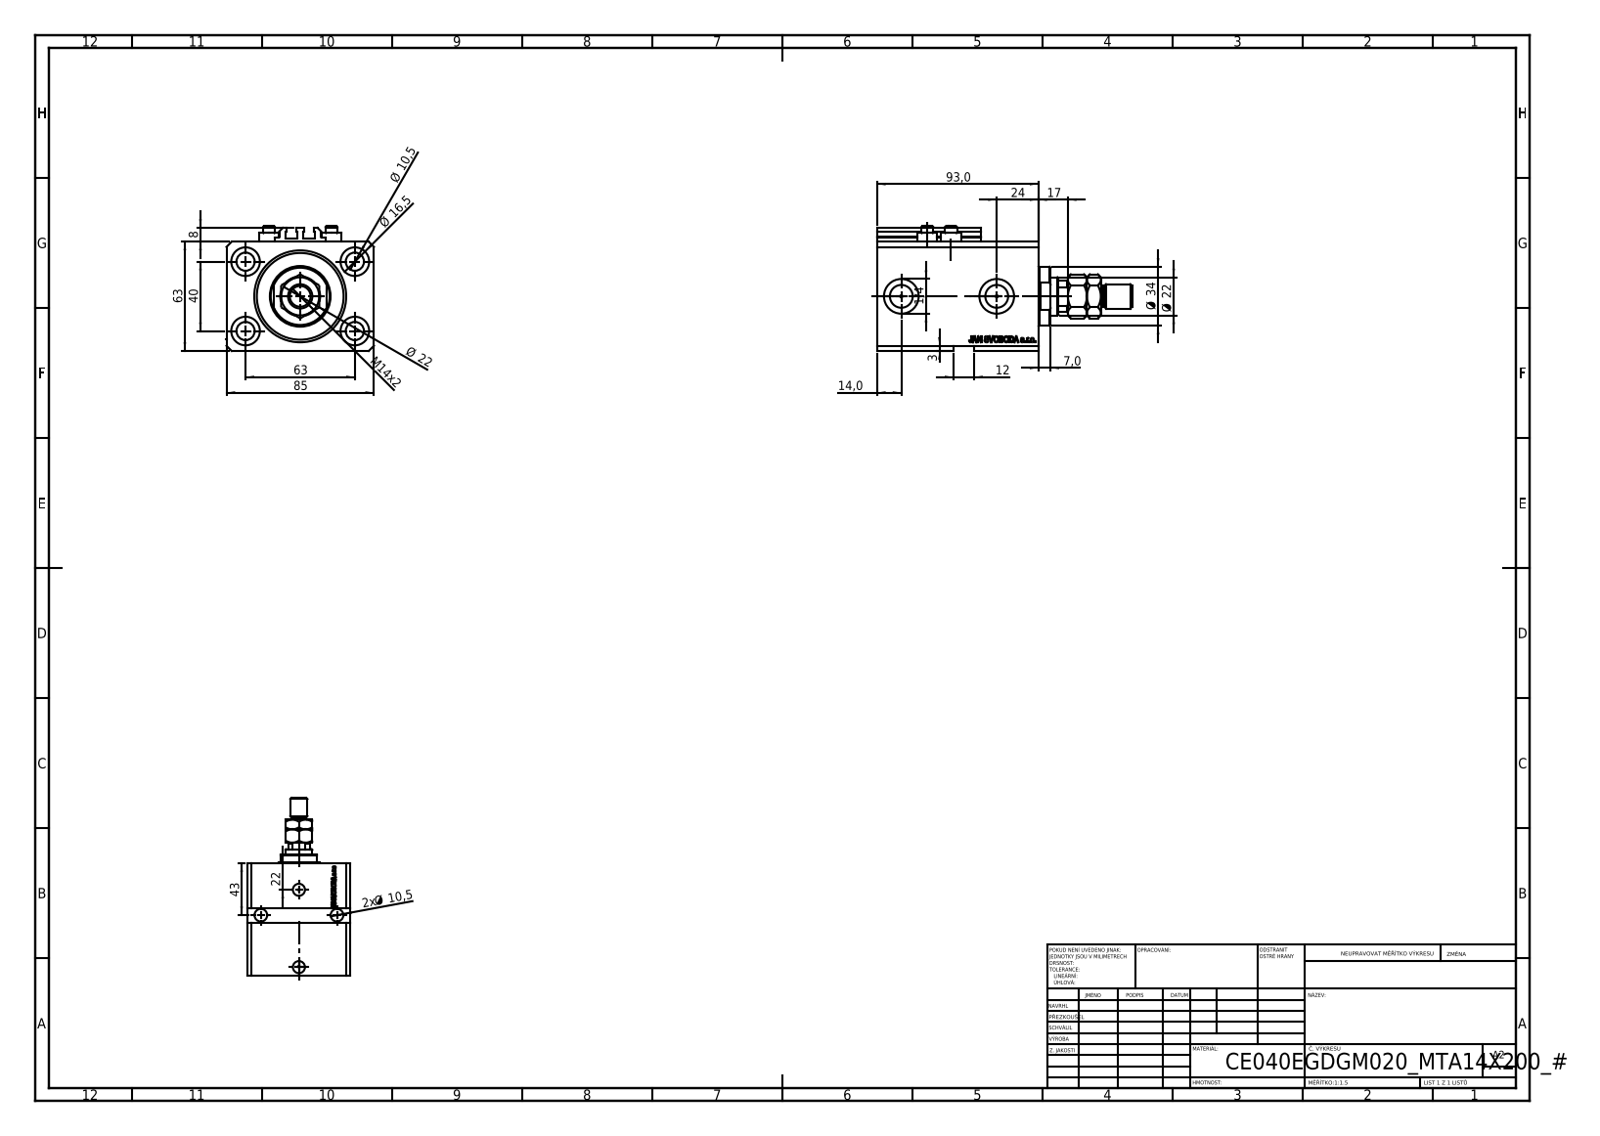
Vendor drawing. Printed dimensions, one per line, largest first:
93,0
85
63
63
43
40
Ø 34
24
Ø 22
Ø 22
22
17
Ø 16,5
M14x2
14,0
12
Ø 10,5
2x Ø 10,5
8
7,0
3
1/4
